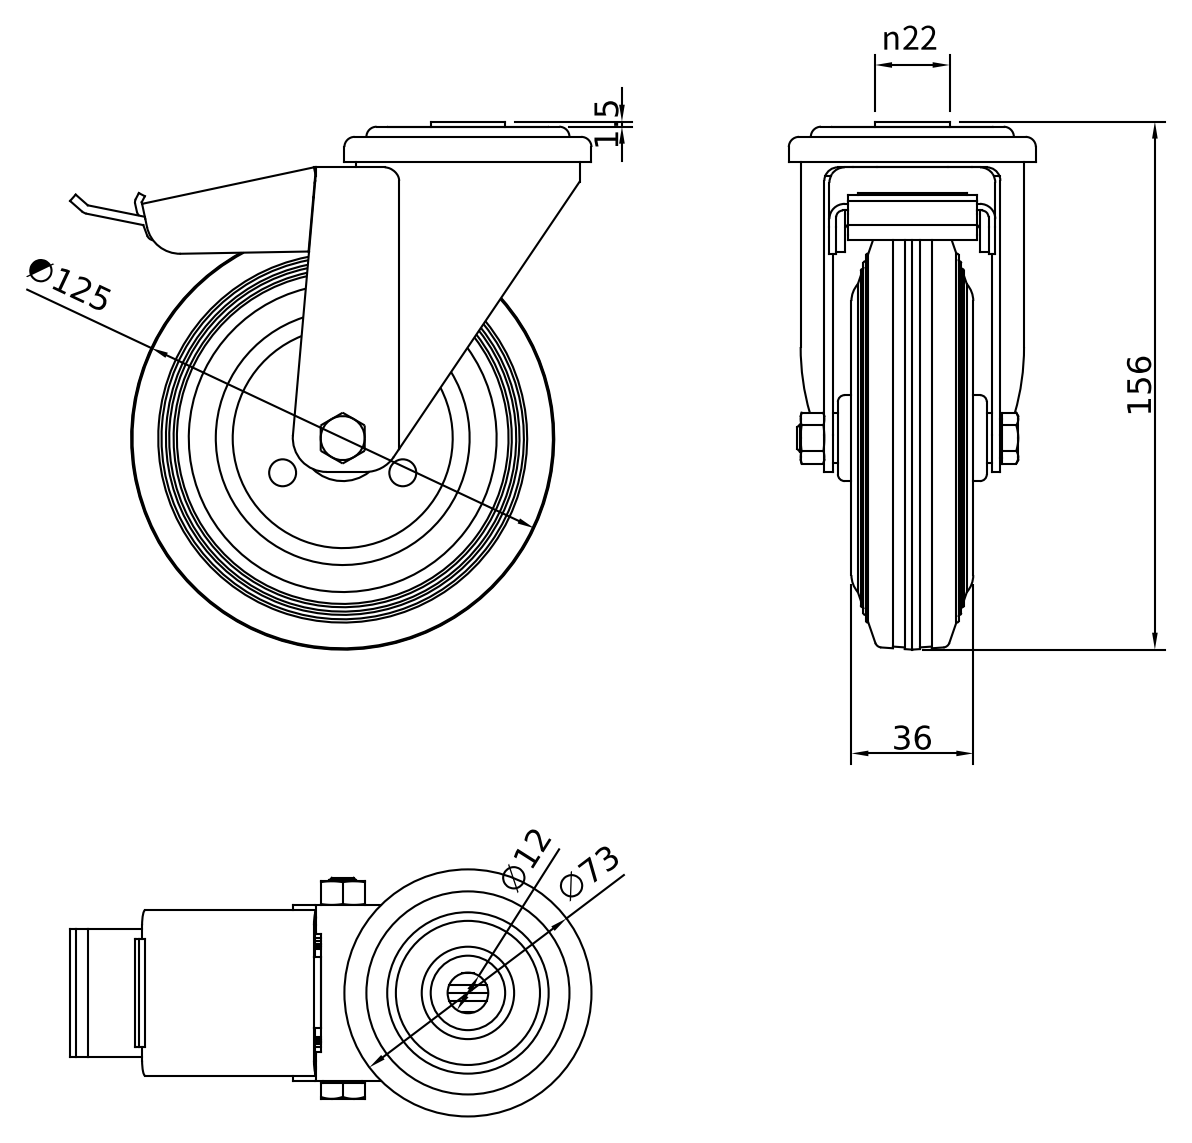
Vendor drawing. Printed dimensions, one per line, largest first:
156
∅125
∅73
36
n22
∅12
1.5
